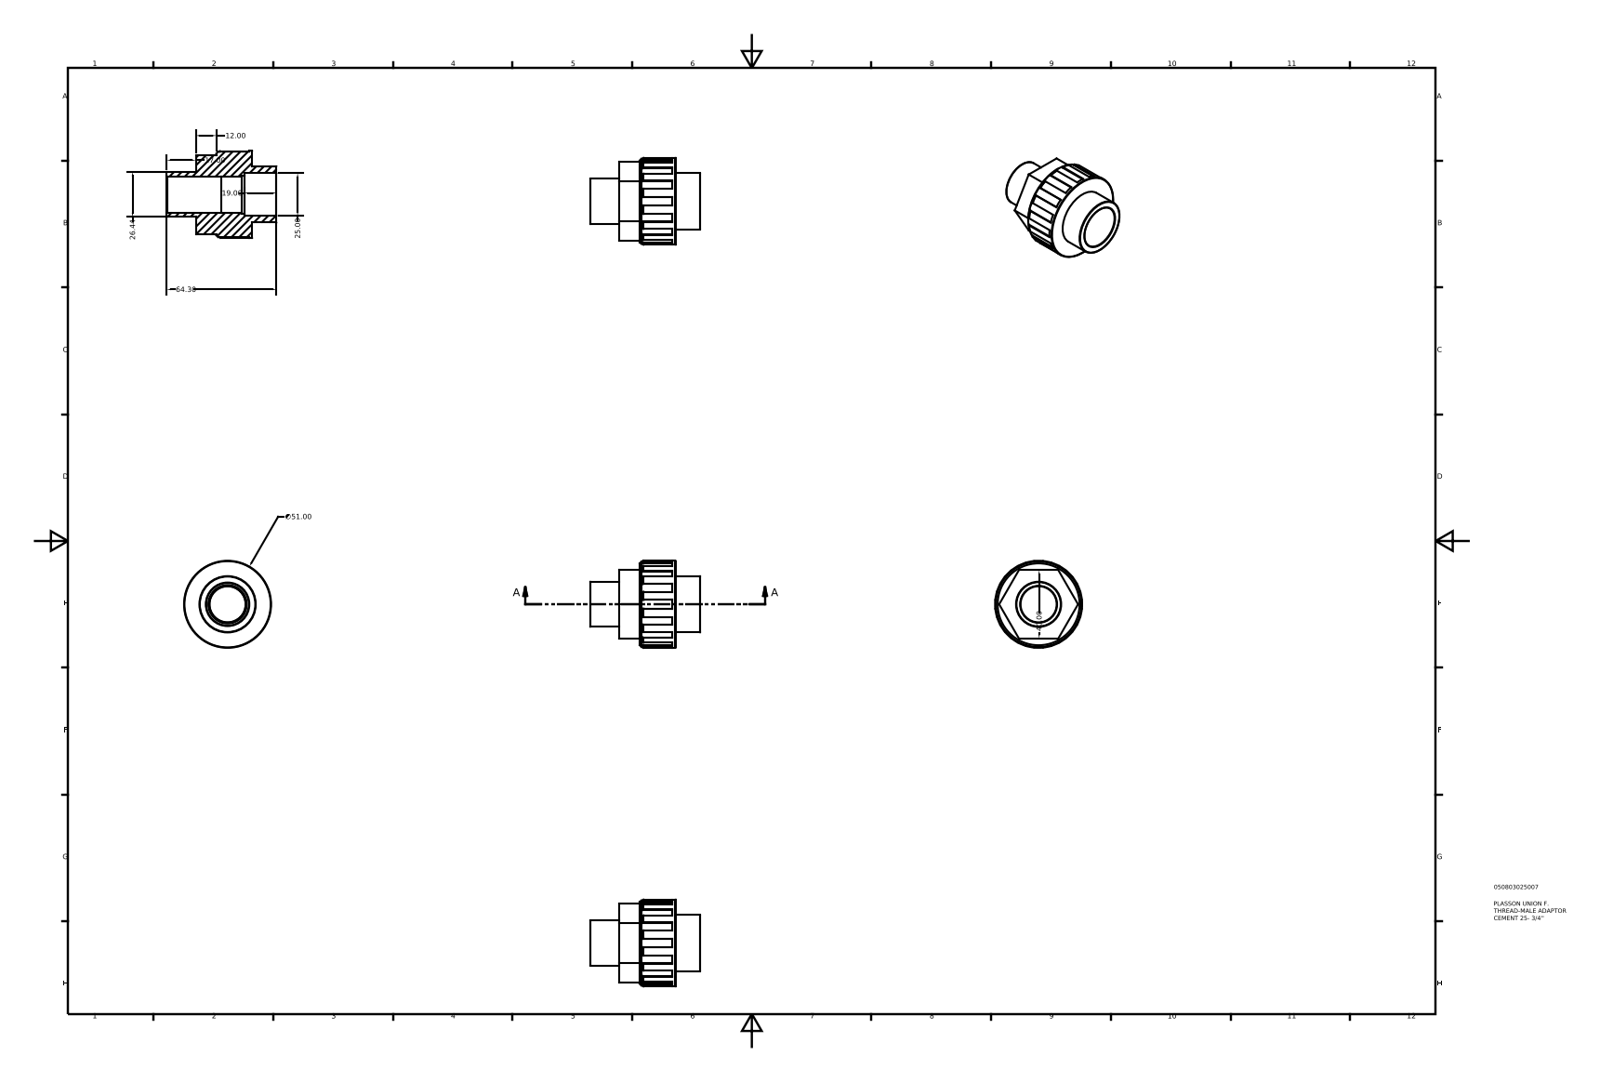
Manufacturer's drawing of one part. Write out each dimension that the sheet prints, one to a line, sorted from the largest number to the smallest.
64.30
∅51.00
40.00
26.44
25.00
19.00
17.00
12.00
